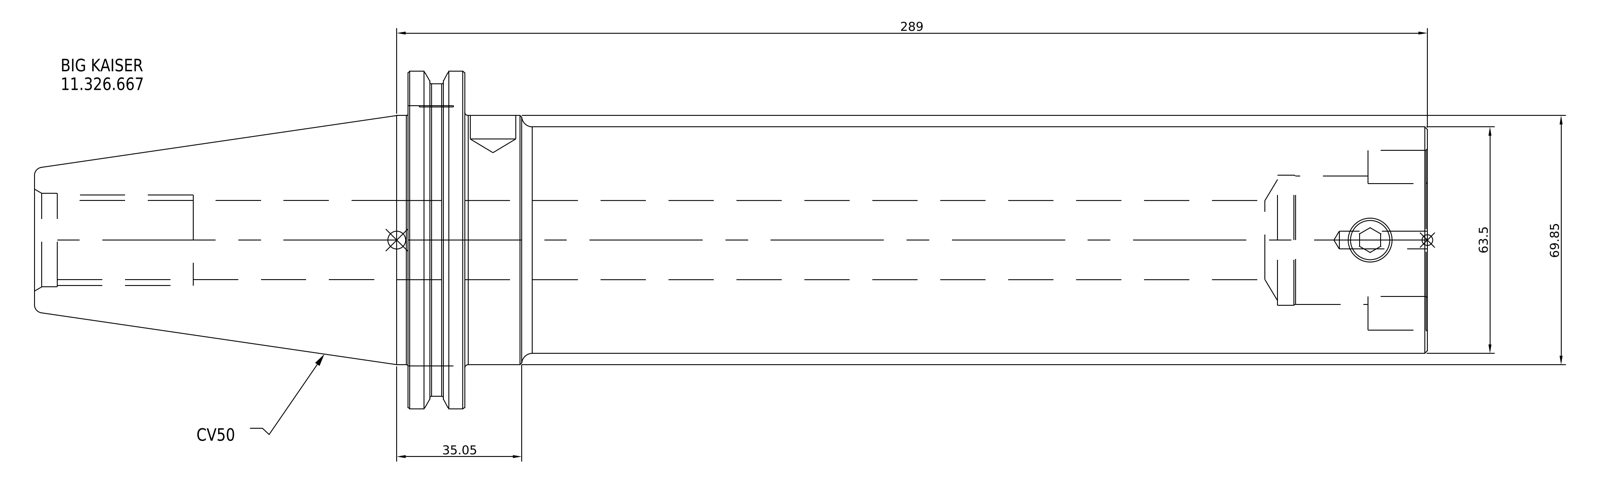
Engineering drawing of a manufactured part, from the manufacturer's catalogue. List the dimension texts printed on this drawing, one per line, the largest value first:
289
69.85
63.5
35.05
